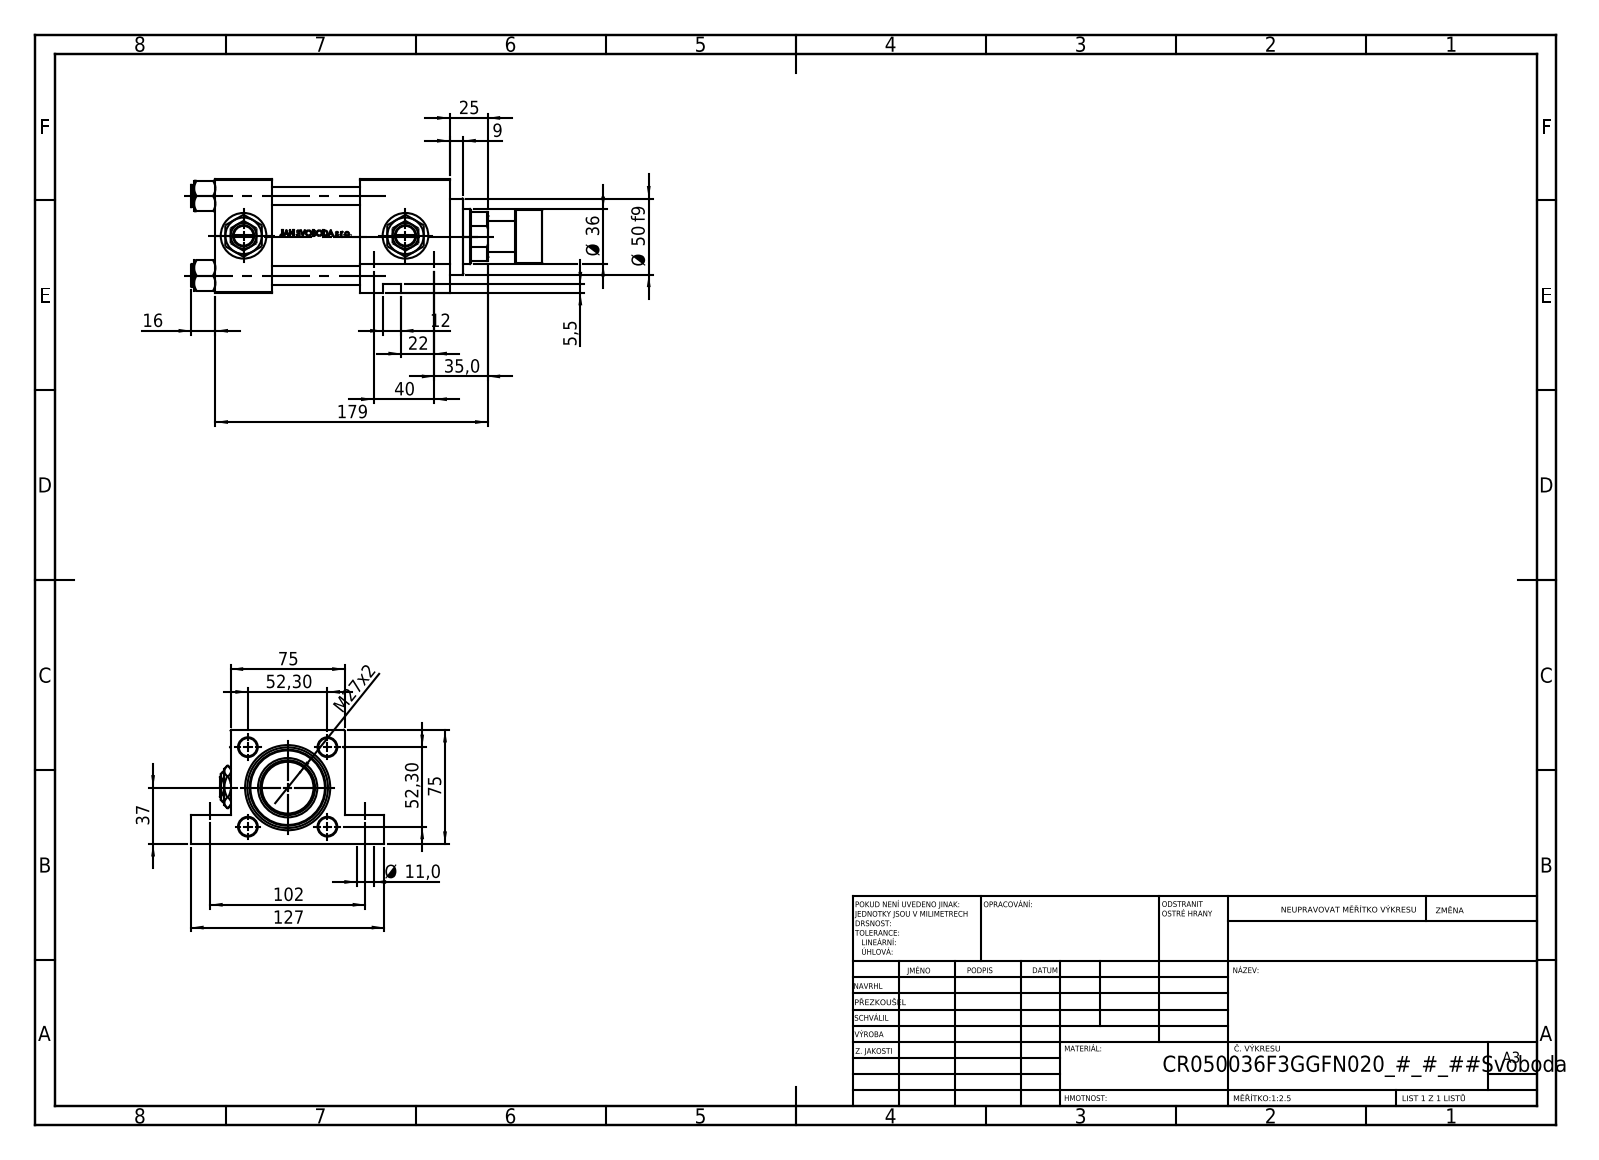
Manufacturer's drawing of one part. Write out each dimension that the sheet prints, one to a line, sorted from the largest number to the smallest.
179
127
102
75
75
52,30
52,30
Ø 50 f9
40
37
Ø 36
35,0
M27x2
25
22
16
12
Ø 11,0
9
5,5
